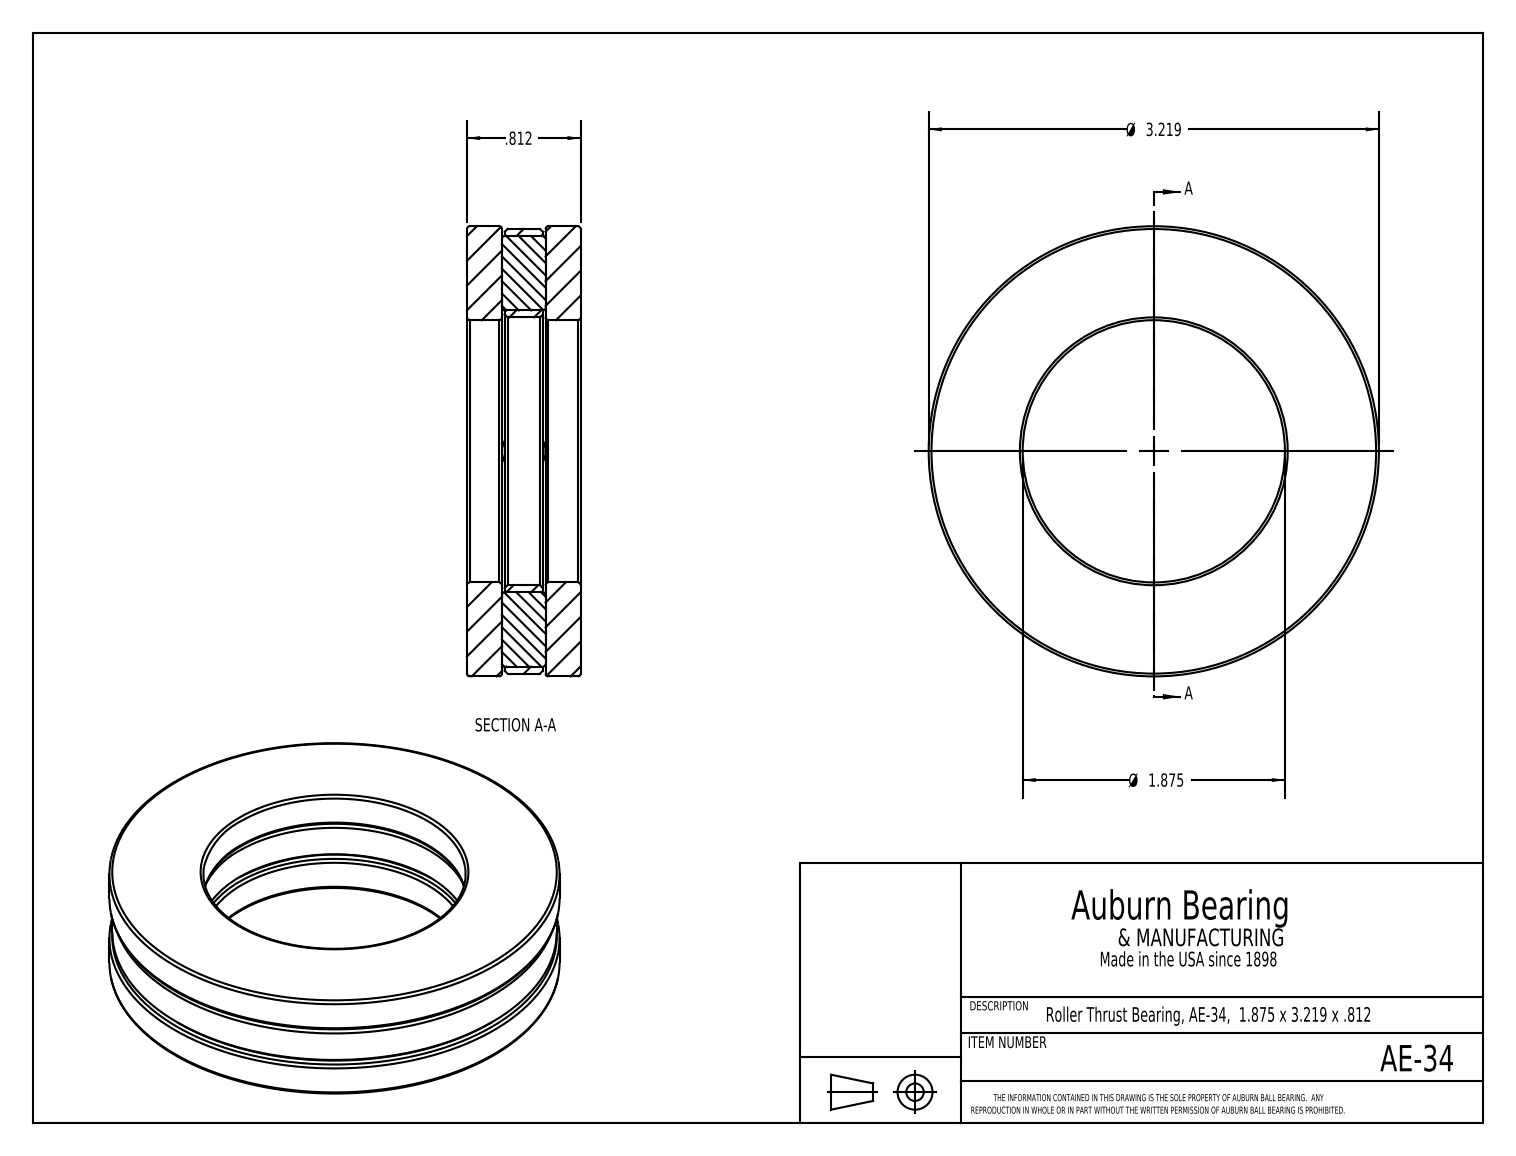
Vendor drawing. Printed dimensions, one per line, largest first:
Ø 3.219
Ø 1.875
.812
